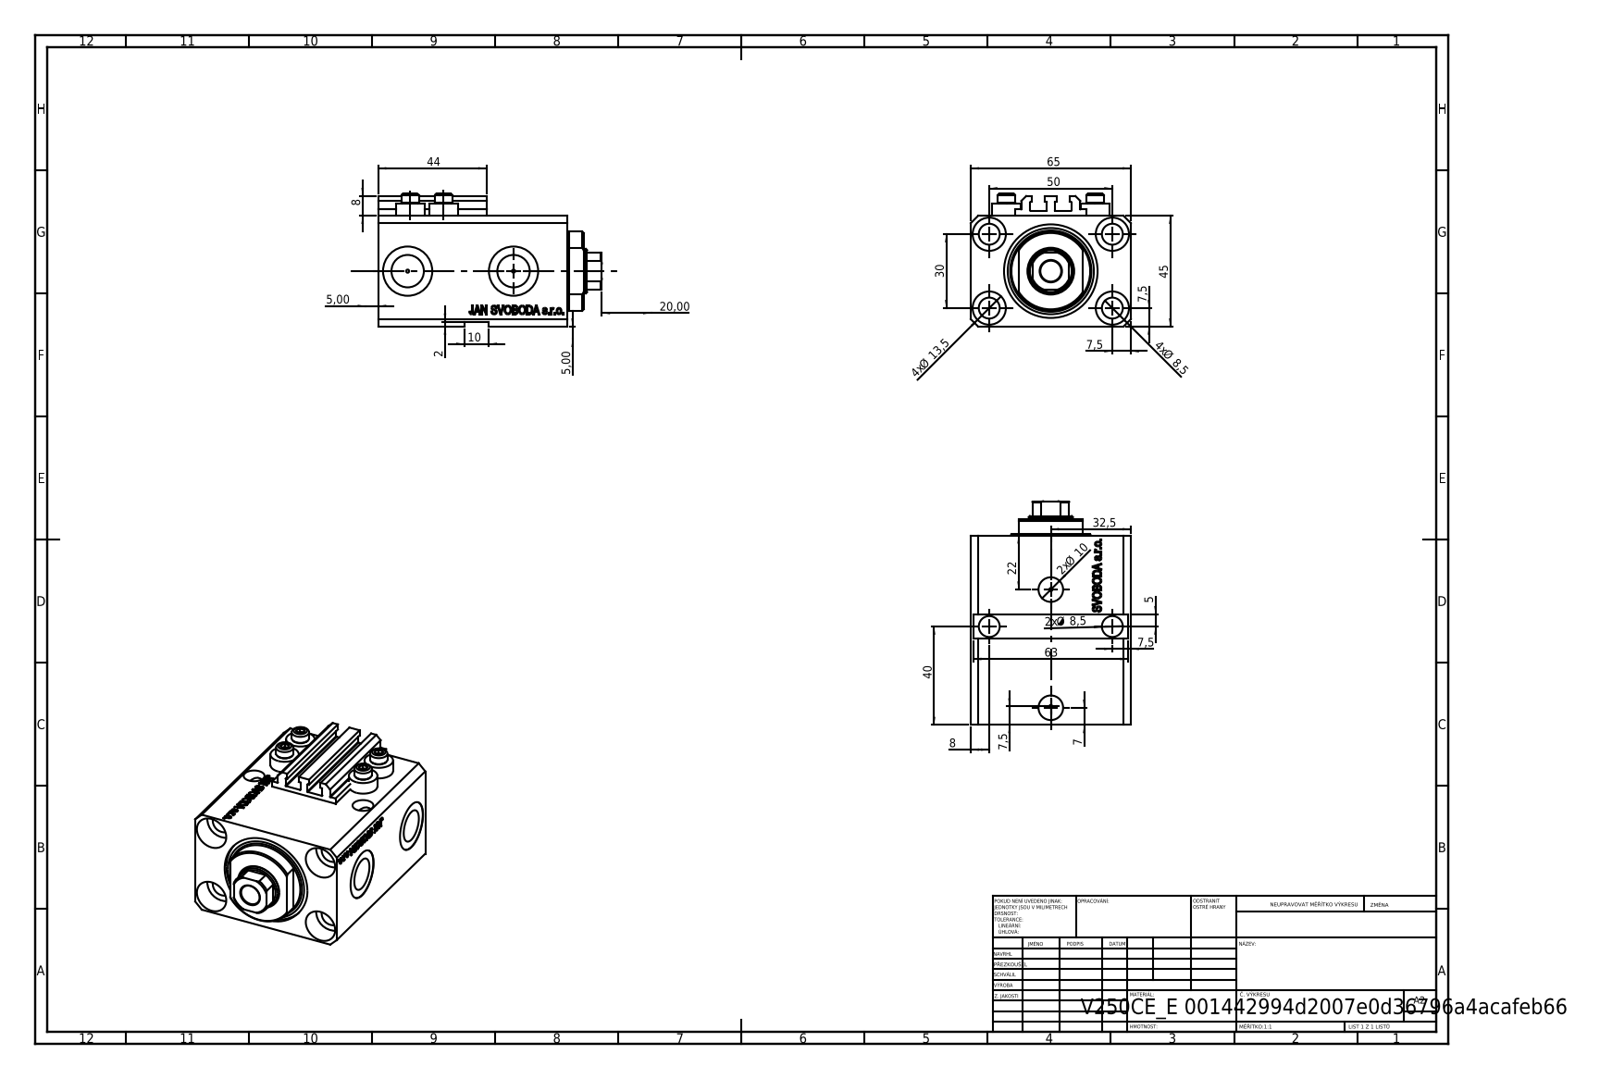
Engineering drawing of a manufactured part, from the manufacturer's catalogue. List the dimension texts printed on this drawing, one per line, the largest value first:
65
63
50
45
44
40
32,5
30
22
20,00
4x Ø 13,5
10
2x Ø 10
4x Ø 8,5
2x Ø 8,5
8
8
7,5
7,5
7,5
7,5
7
5,00
5,00
5
2
